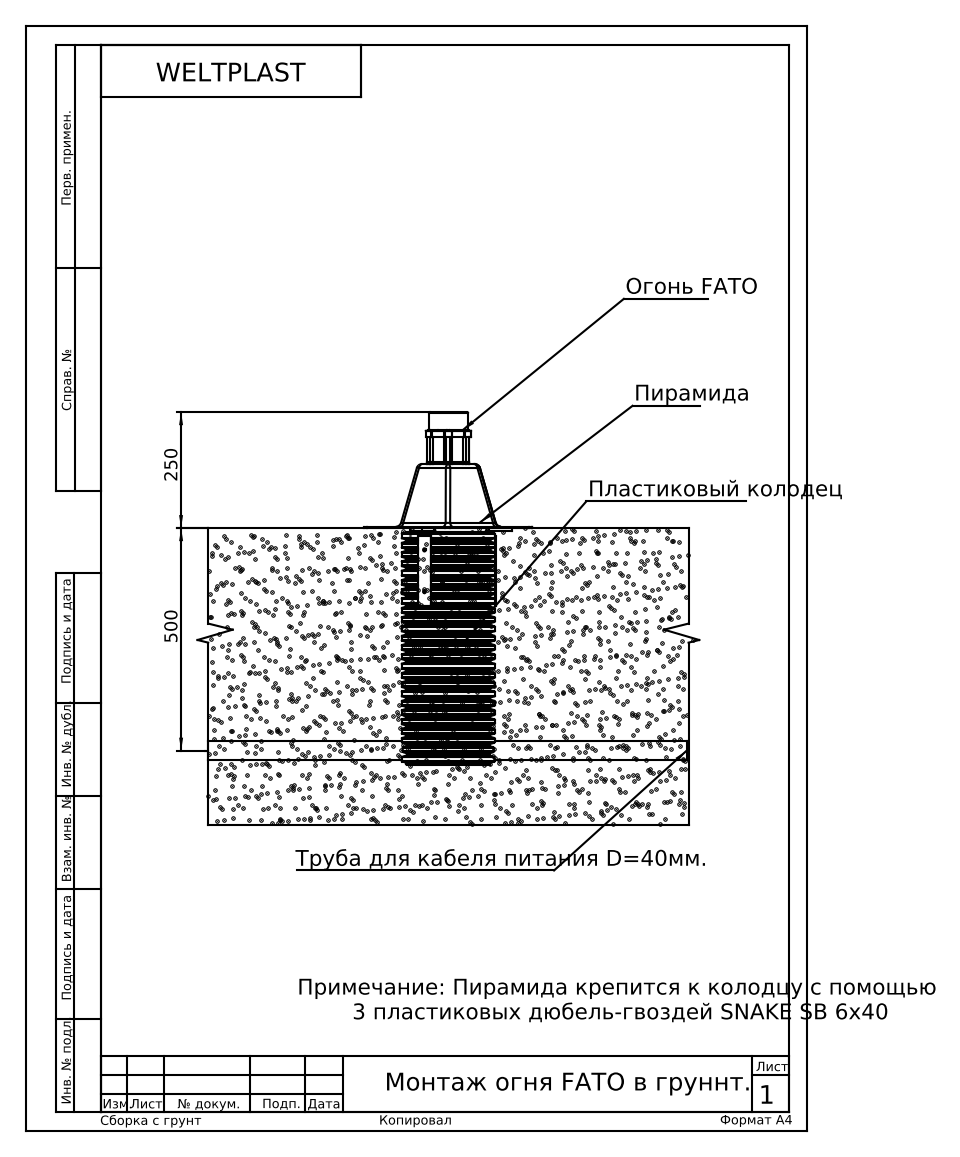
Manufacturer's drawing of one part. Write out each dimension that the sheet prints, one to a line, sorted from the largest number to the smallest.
500
250
